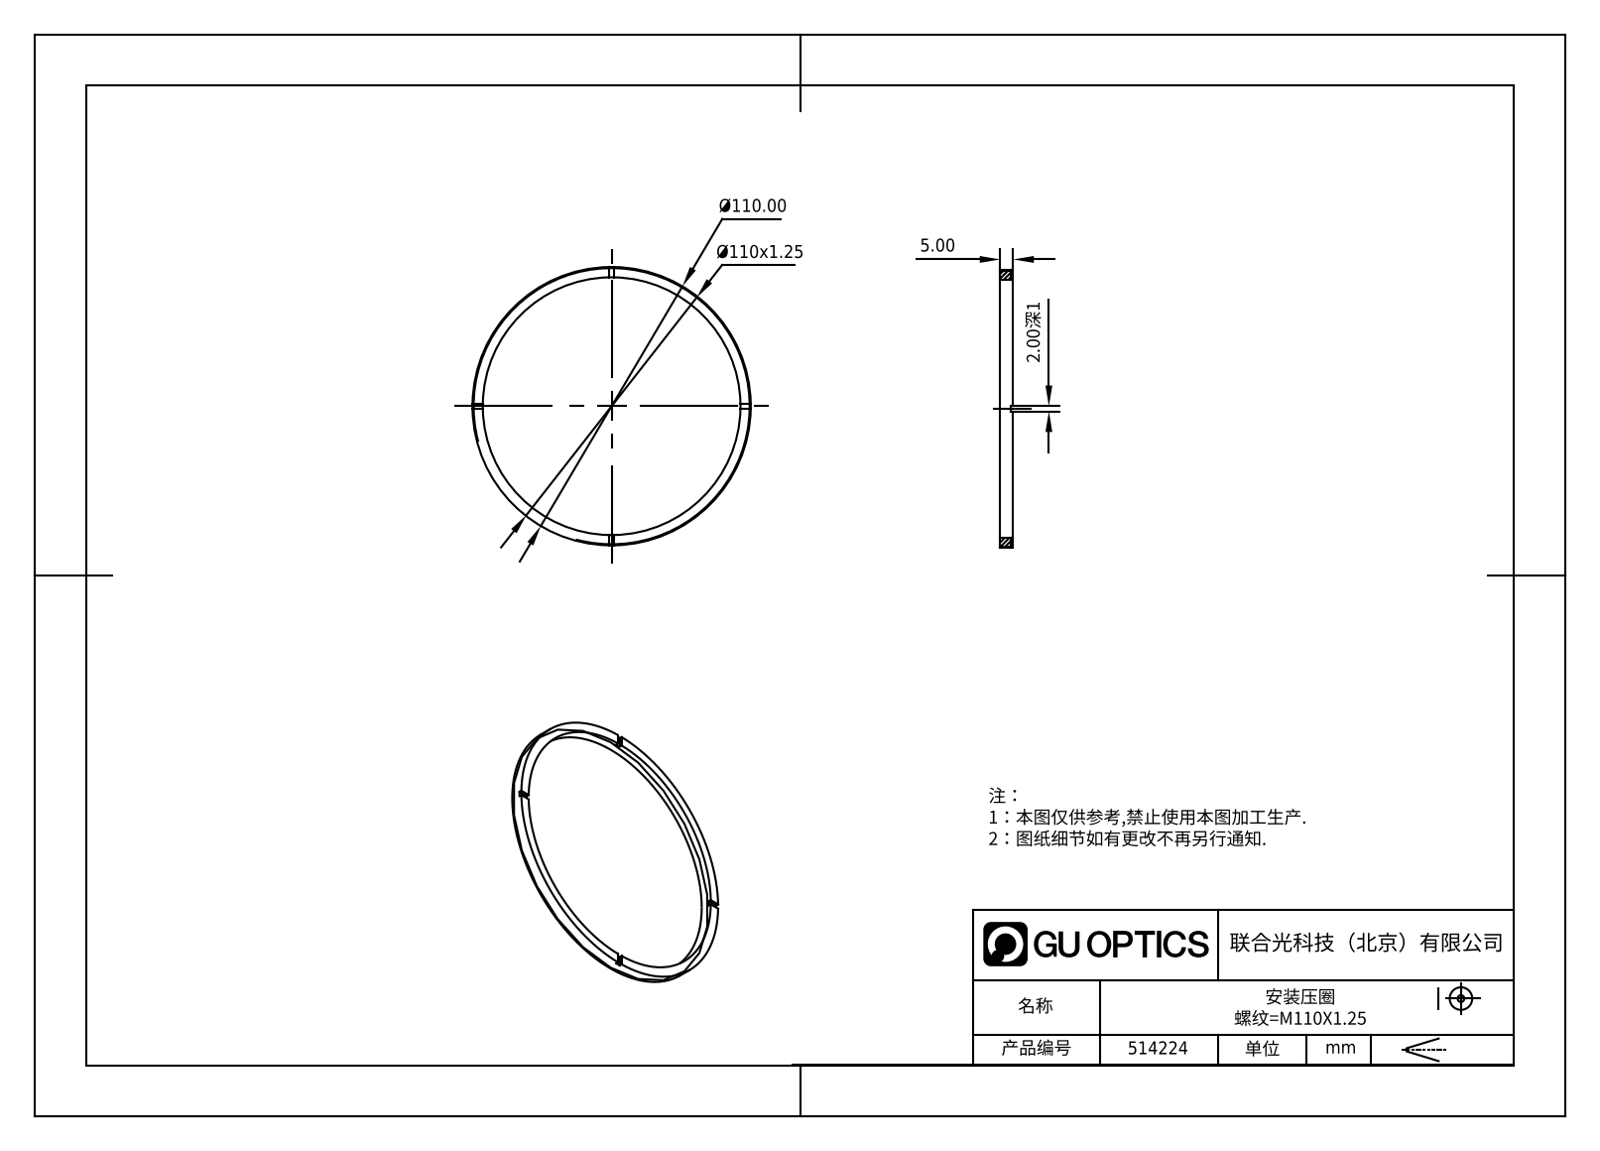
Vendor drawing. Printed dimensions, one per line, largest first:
Ø110.00
Ø110x1.25
5.00
2.00深1
